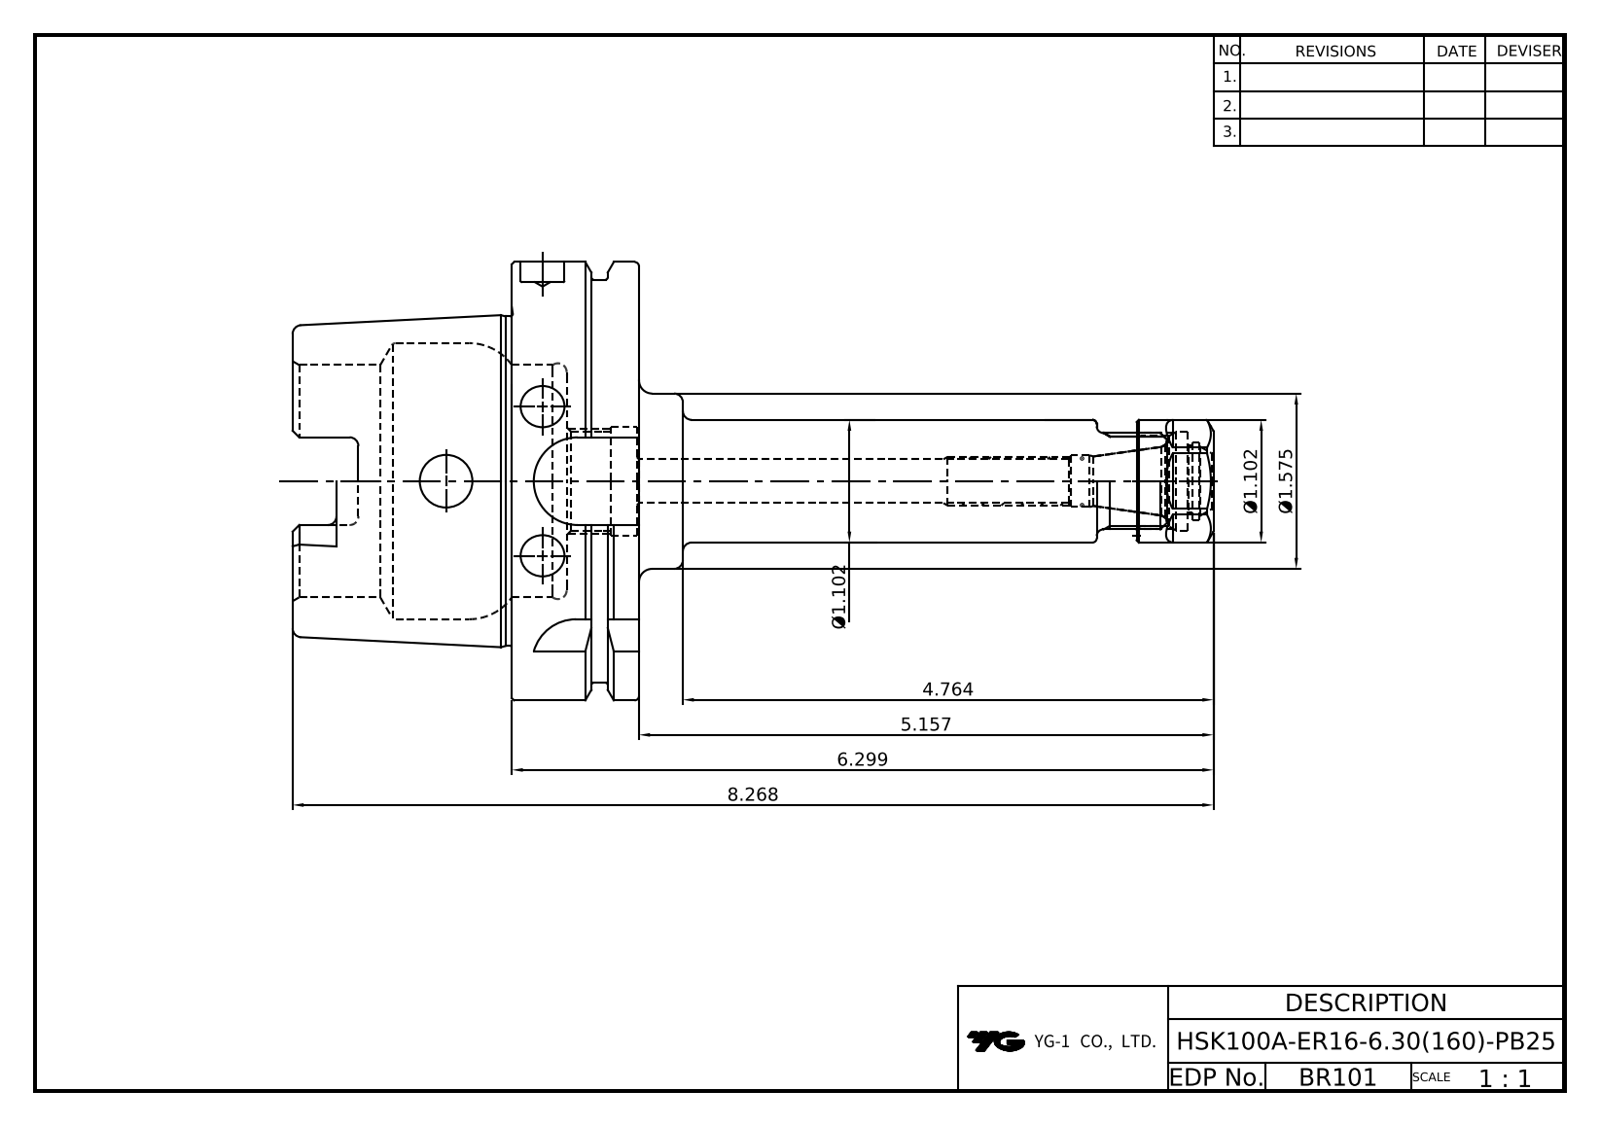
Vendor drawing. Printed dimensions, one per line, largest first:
8.268
6.299
5.157
4.764
Ø1.575
Ø1.102
Ø1.102
